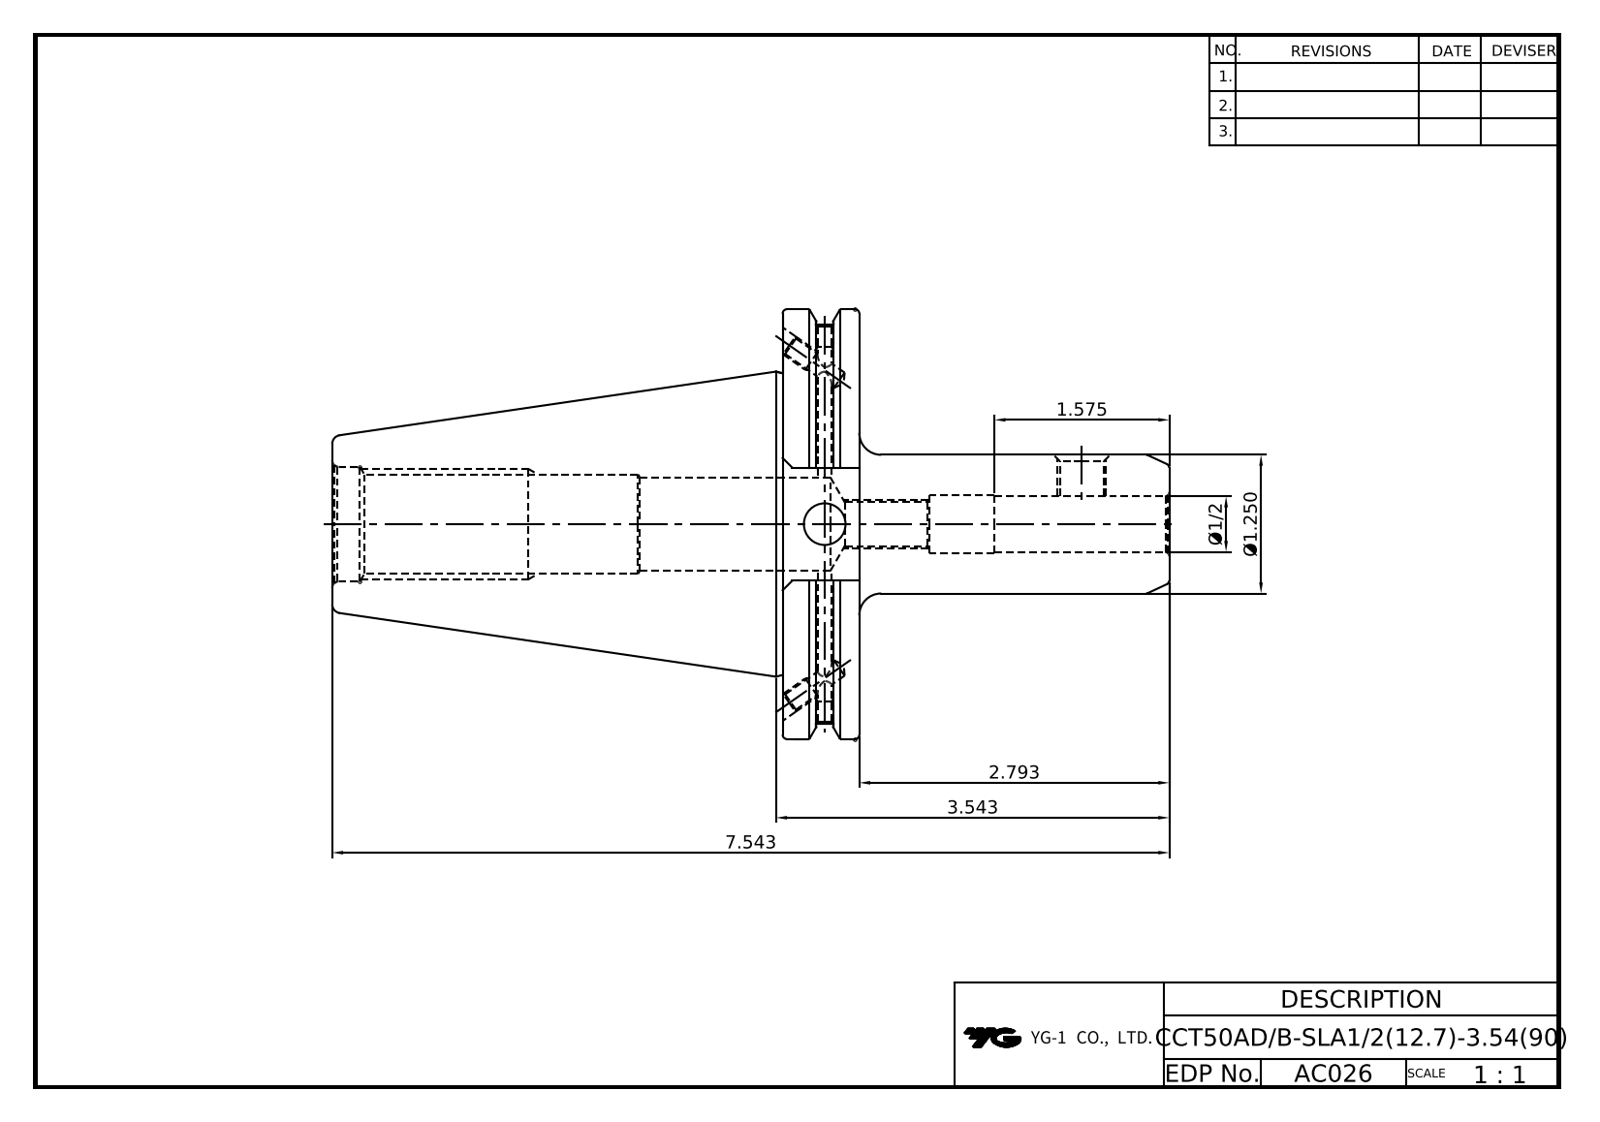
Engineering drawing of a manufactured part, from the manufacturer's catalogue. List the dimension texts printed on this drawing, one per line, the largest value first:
7.543
3.543
2.793
1.575
Ø1.250
Ø1/2
